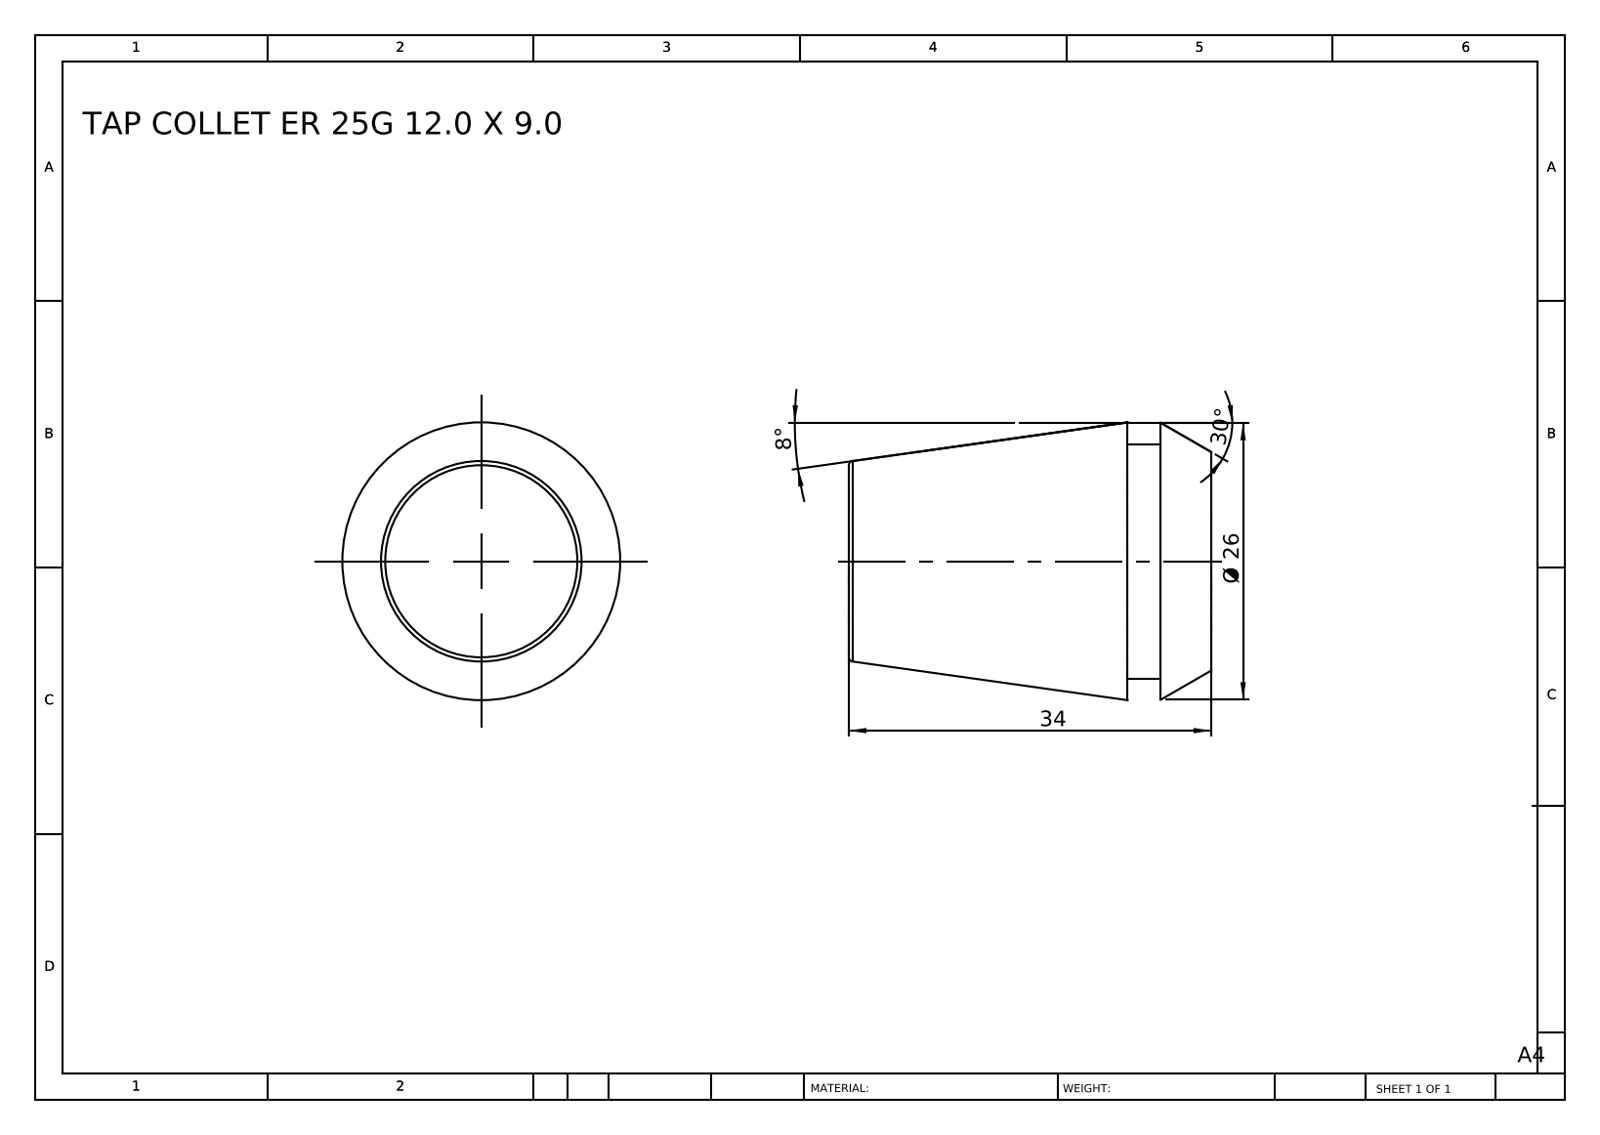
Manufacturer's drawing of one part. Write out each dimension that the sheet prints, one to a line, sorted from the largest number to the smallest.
34
30°
Ø 26
8°
